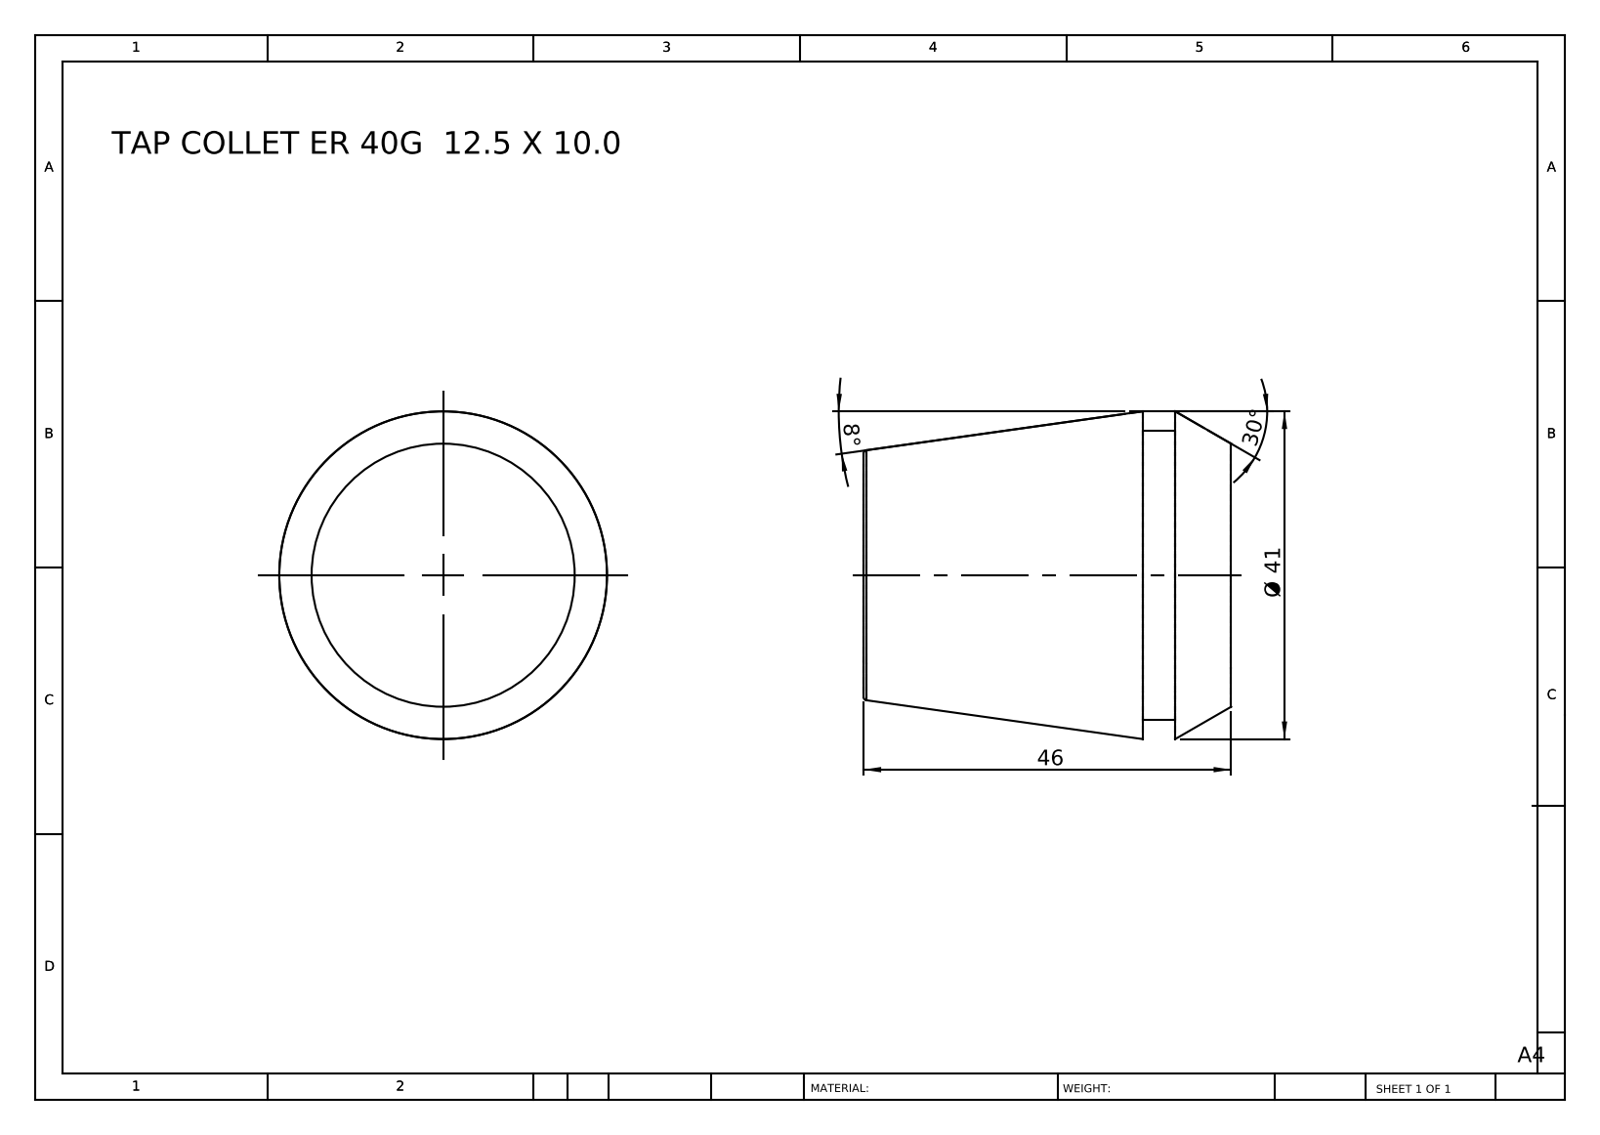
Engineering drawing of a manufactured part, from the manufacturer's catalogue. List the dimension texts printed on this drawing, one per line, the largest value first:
46
Ø 41
30°
8°
